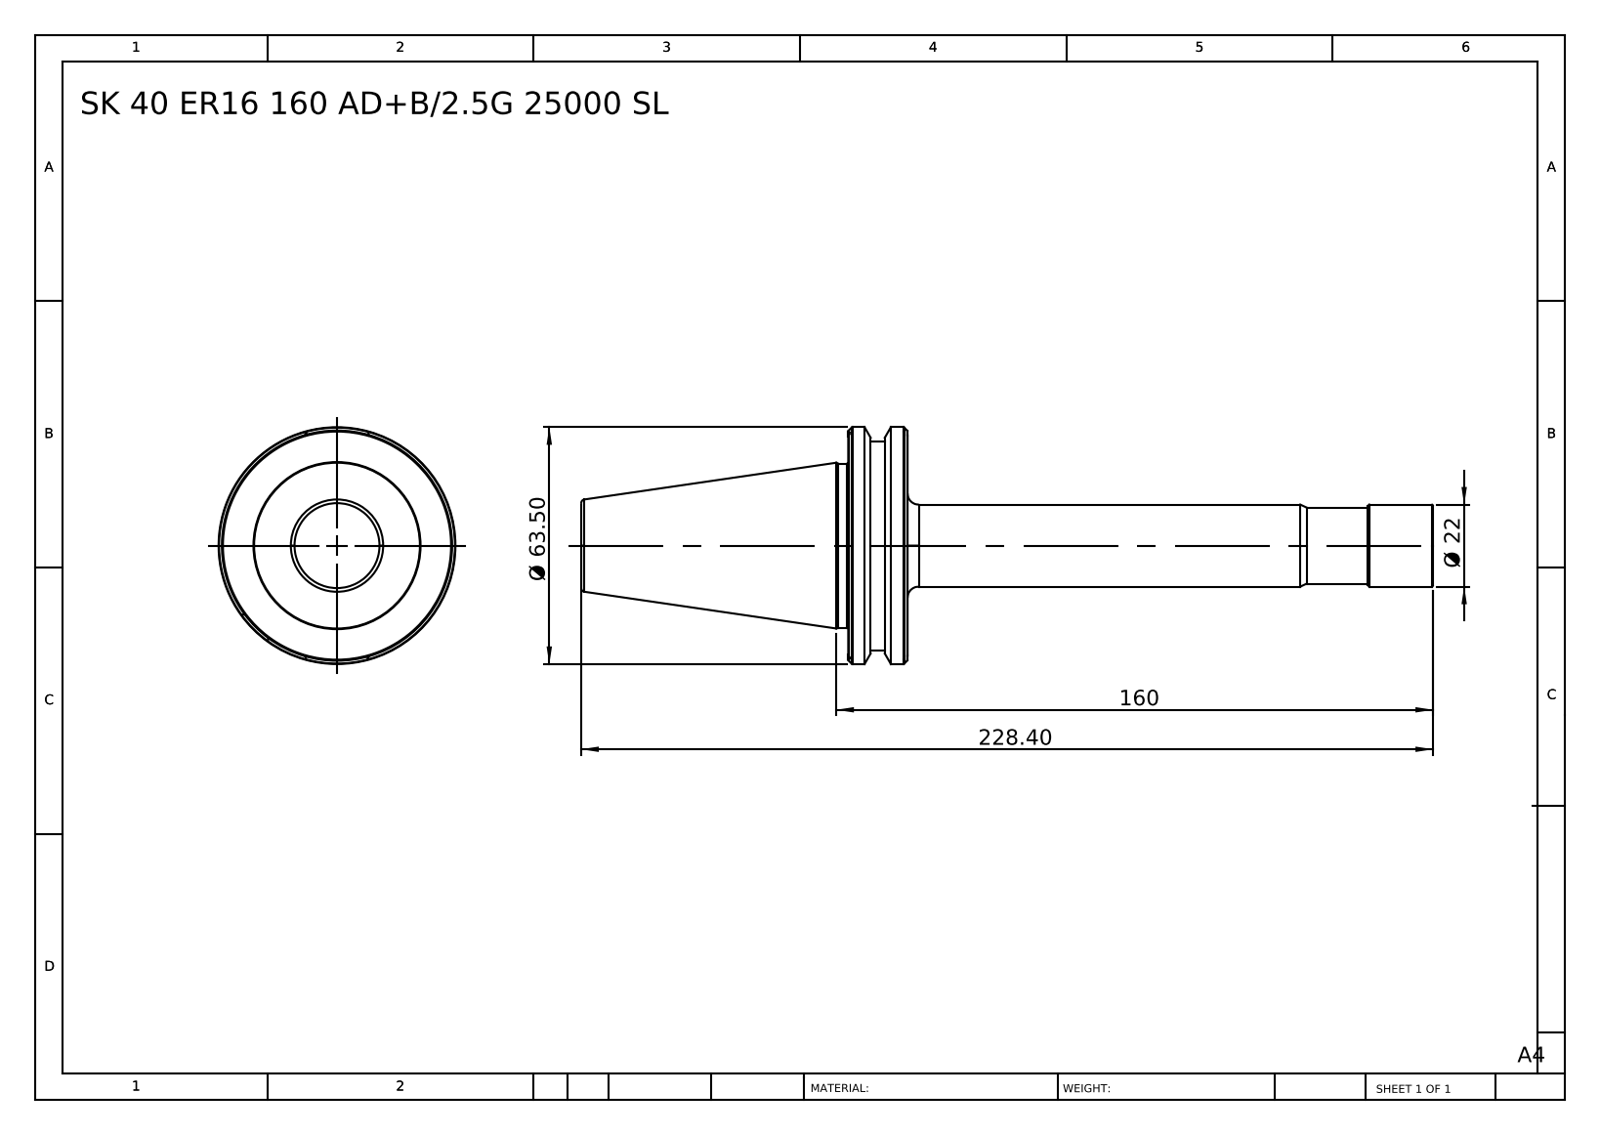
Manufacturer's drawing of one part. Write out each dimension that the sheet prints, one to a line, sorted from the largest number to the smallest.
228.40
160
Ø 63.50
Ø 22
